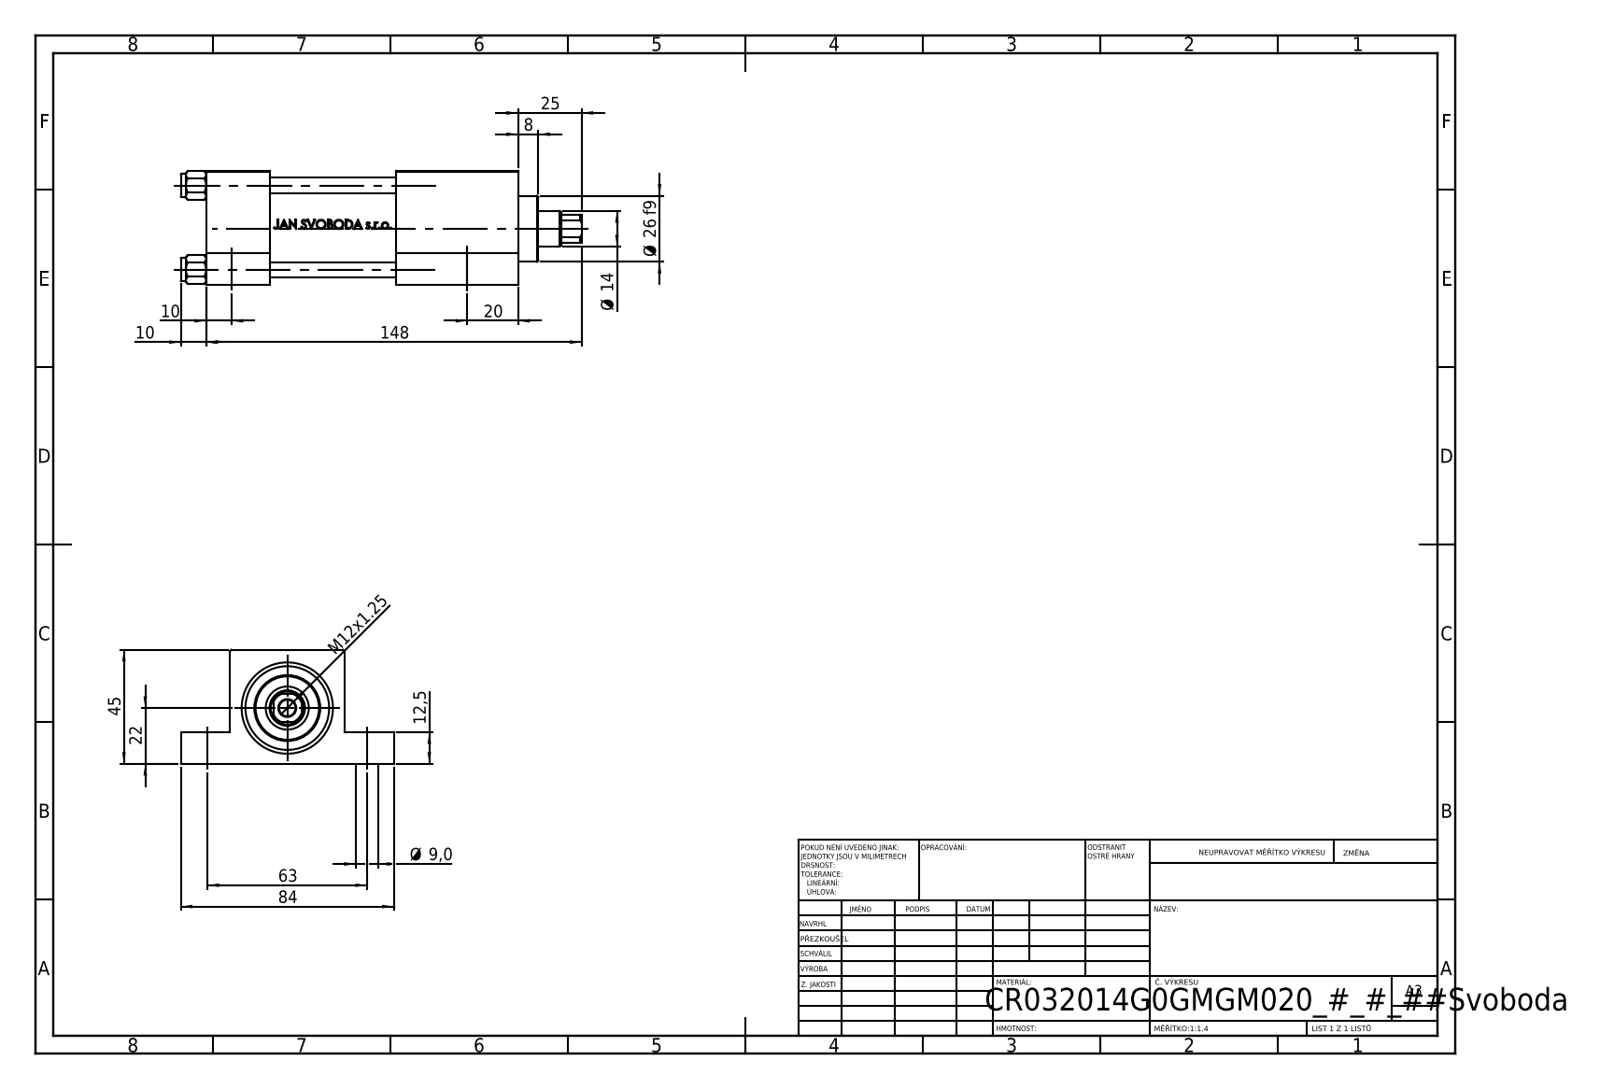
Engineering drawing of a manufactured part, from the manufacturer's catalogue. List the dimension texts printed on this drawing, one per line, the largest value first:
148
84
63
45
Ø 26 f9
25
22
20
Ø 14
12,5
M12x1.25
10
10
Ø 9,0
8
